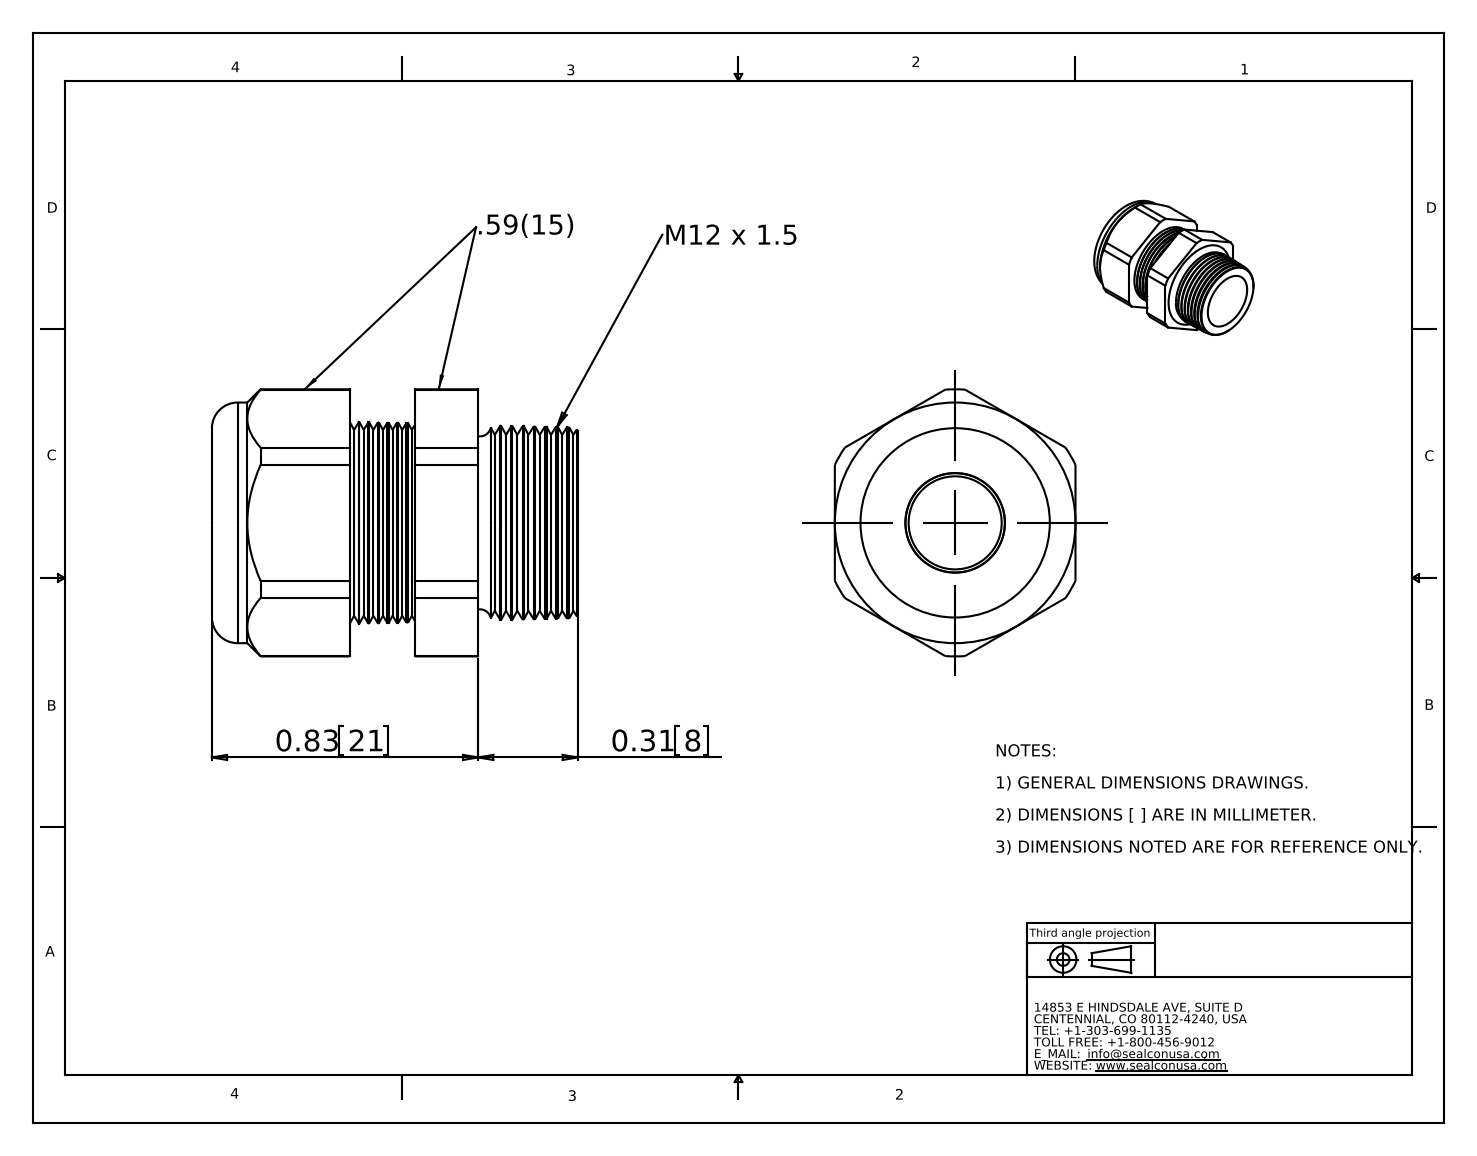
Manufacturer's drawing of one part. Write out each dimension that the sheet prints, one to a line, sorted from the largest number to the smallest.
0.83 21
0.31 8
